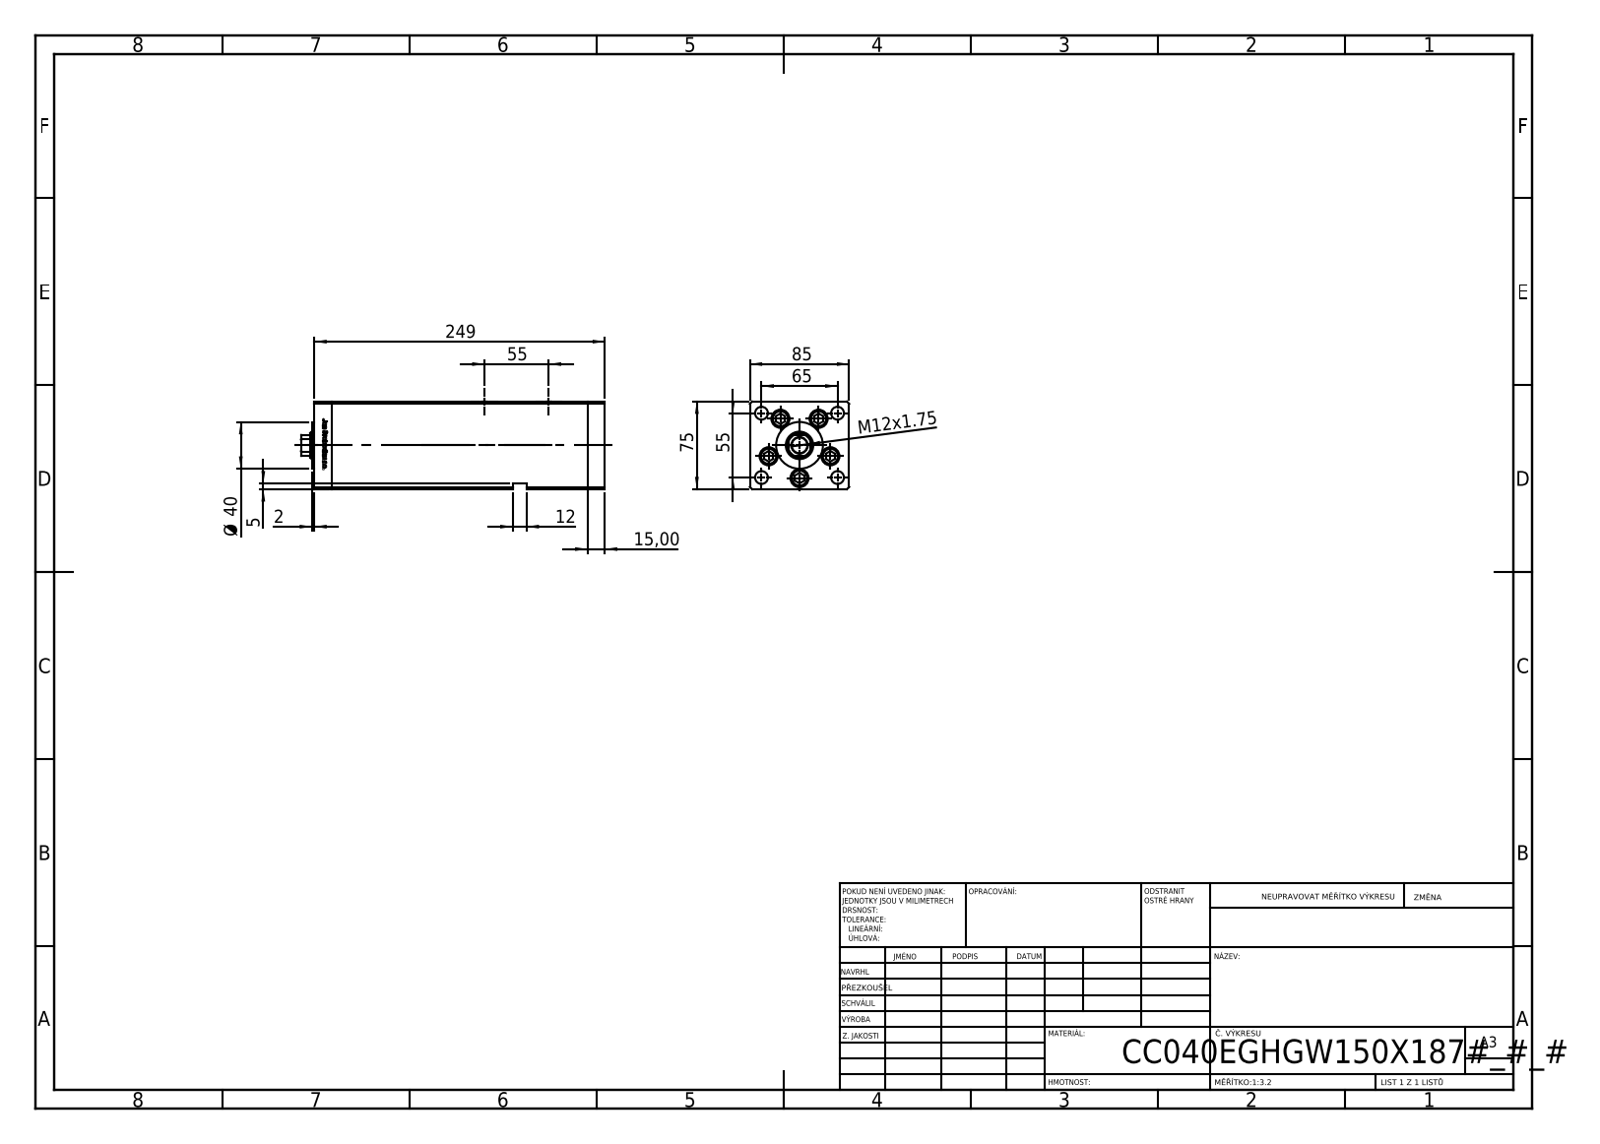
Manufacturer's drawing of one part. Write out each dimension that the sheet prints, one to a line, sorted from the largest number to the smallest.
249
85
75
65
55
55
Ø 40
15,00
12
M12x1.75
5
2
